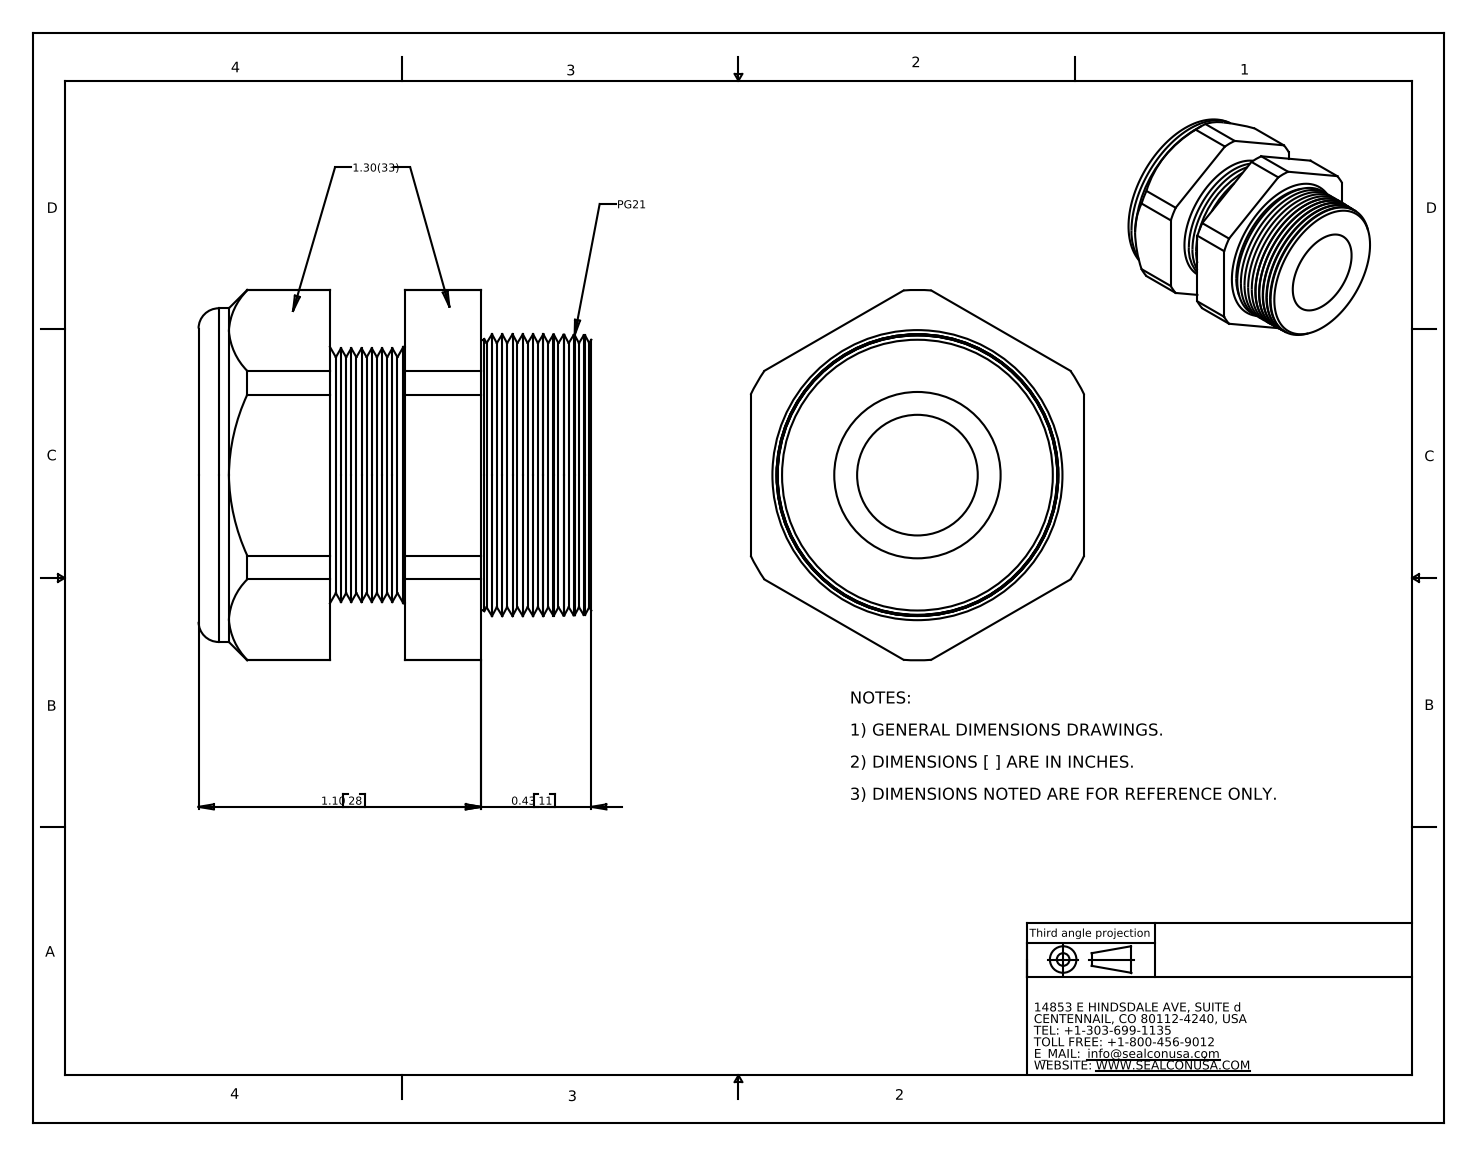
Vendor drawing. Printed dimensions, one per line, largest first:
1.10 28
0.43 11
